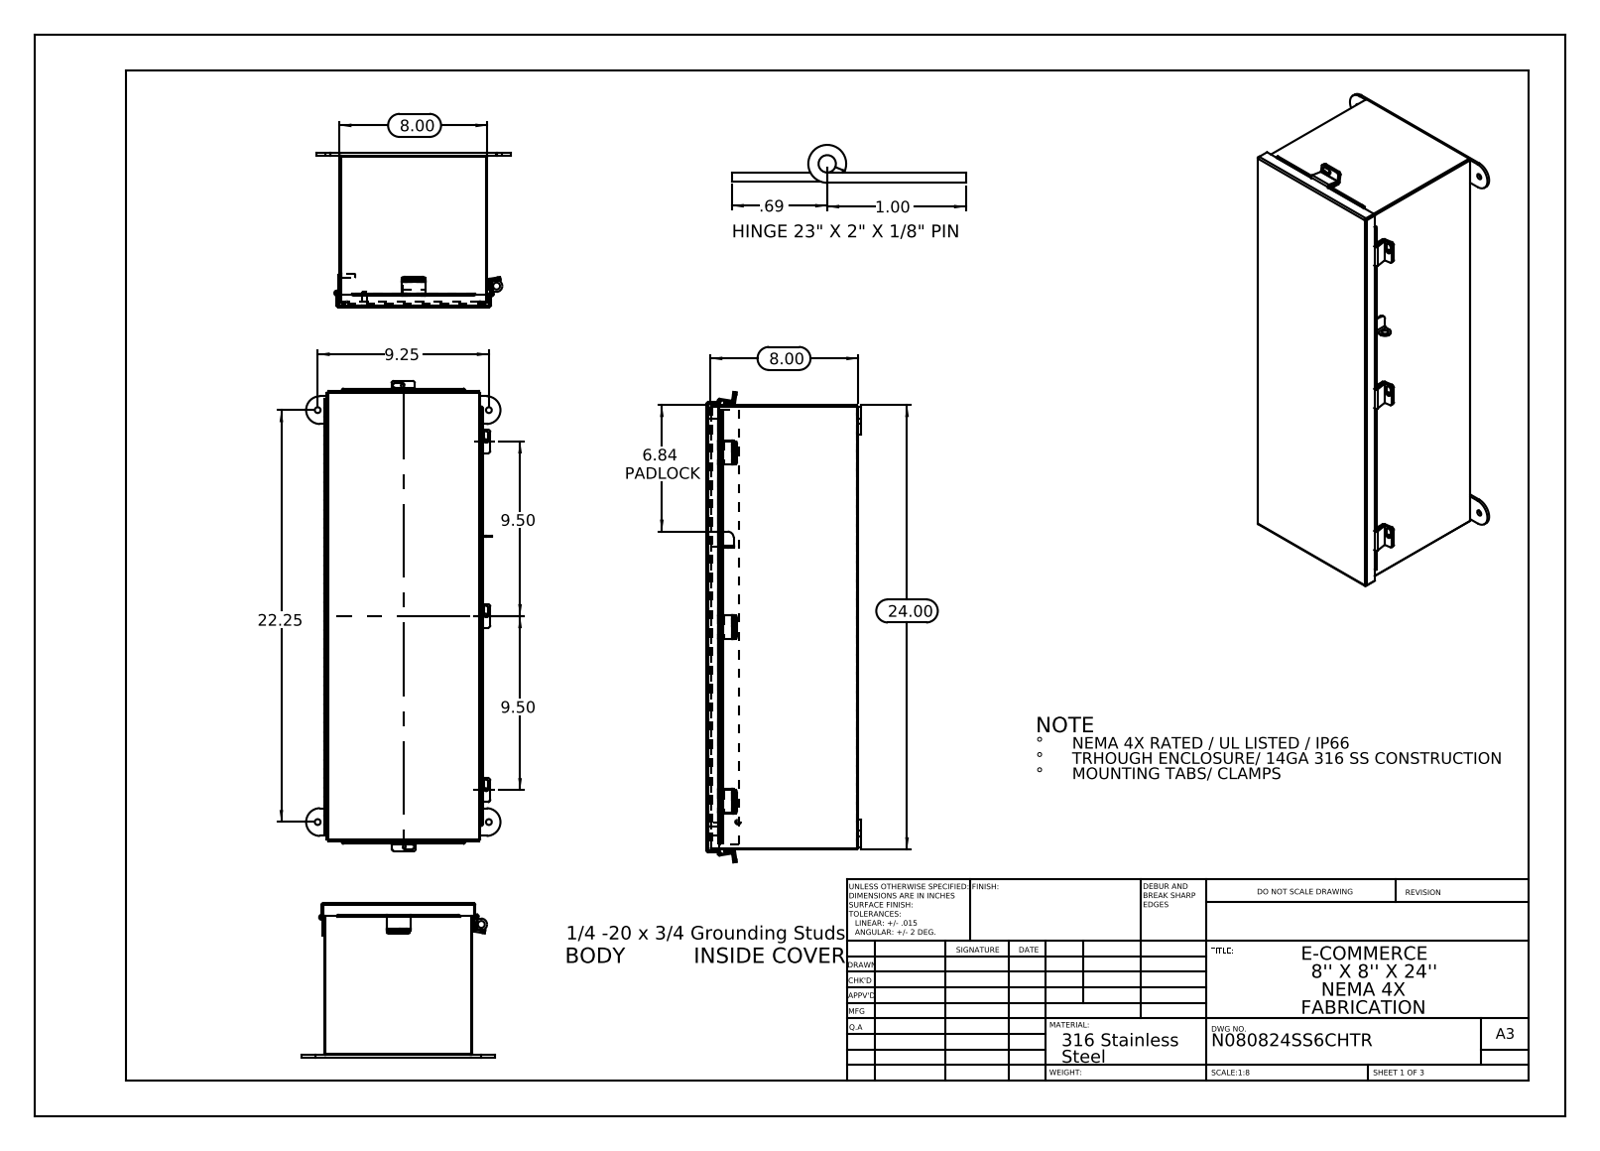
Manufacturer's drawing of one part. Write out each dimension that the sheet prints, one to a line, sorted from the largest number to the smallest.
24.00
22.25
9.50
9.50
9.25
8.00
8.00
6.84 PADLOCK
1.00
.69
